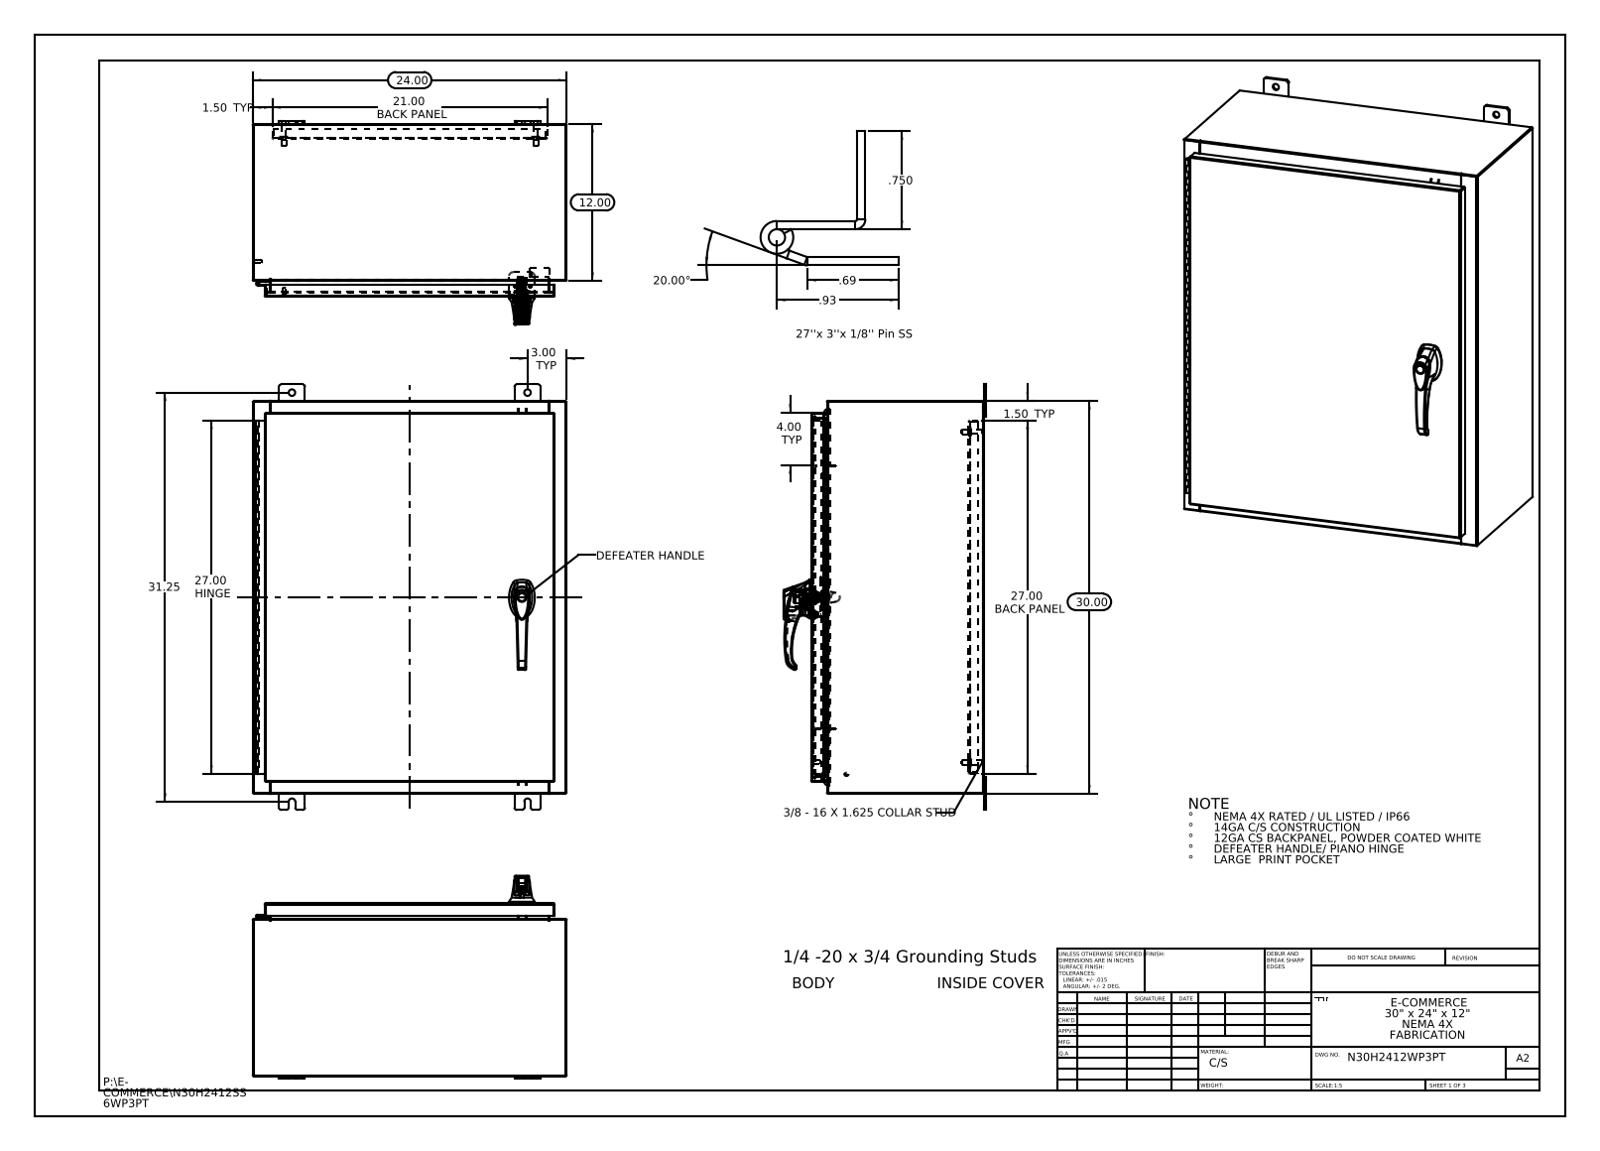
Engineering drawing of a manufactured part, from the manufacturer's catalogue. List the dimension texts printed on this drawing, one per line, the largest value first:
31.25
30.00
27.00 HINGE
27.00 BACK PANEL
24.00
21.00 BACK PANEL
20.00°
12.00
4.00 TYP
3.00 TYP
1.50 TYP
1.50 TYP
.93
.750
.69
